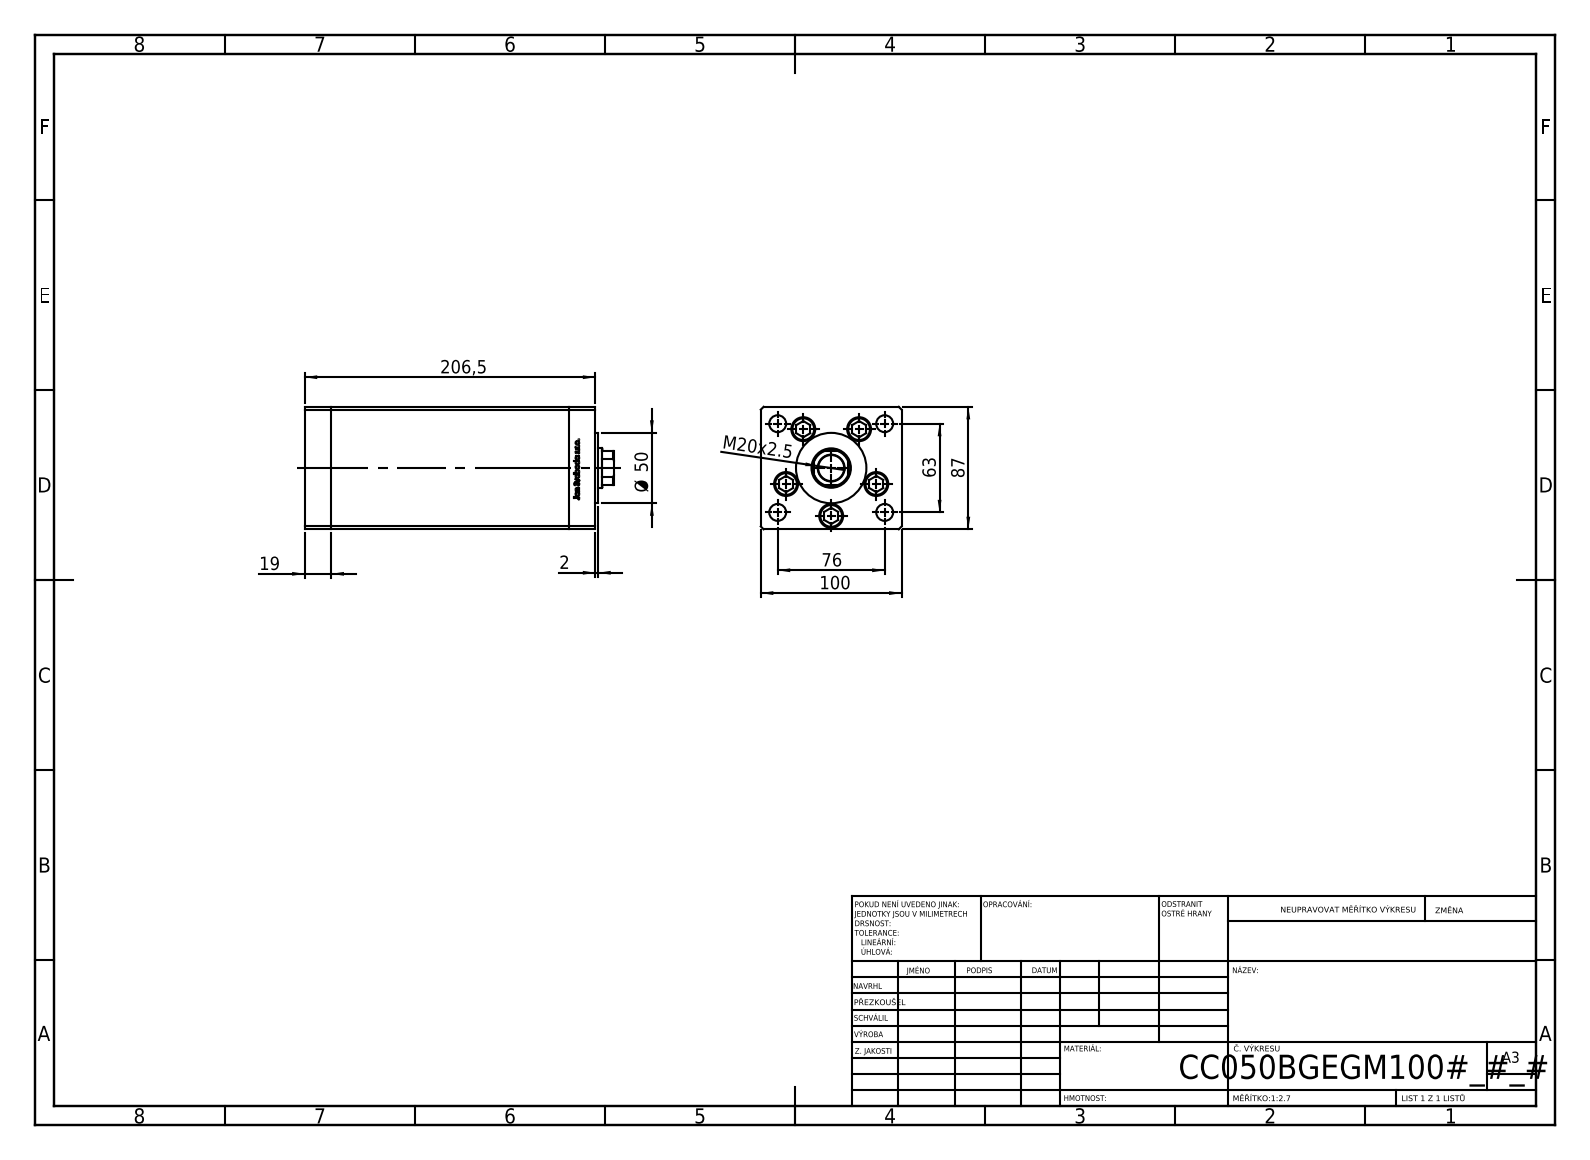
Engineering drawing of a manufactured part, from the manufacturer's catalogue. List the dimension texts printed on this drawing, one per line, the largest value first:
206,5
100
87
76
63
Ø 50
M20x2.5
19
2
